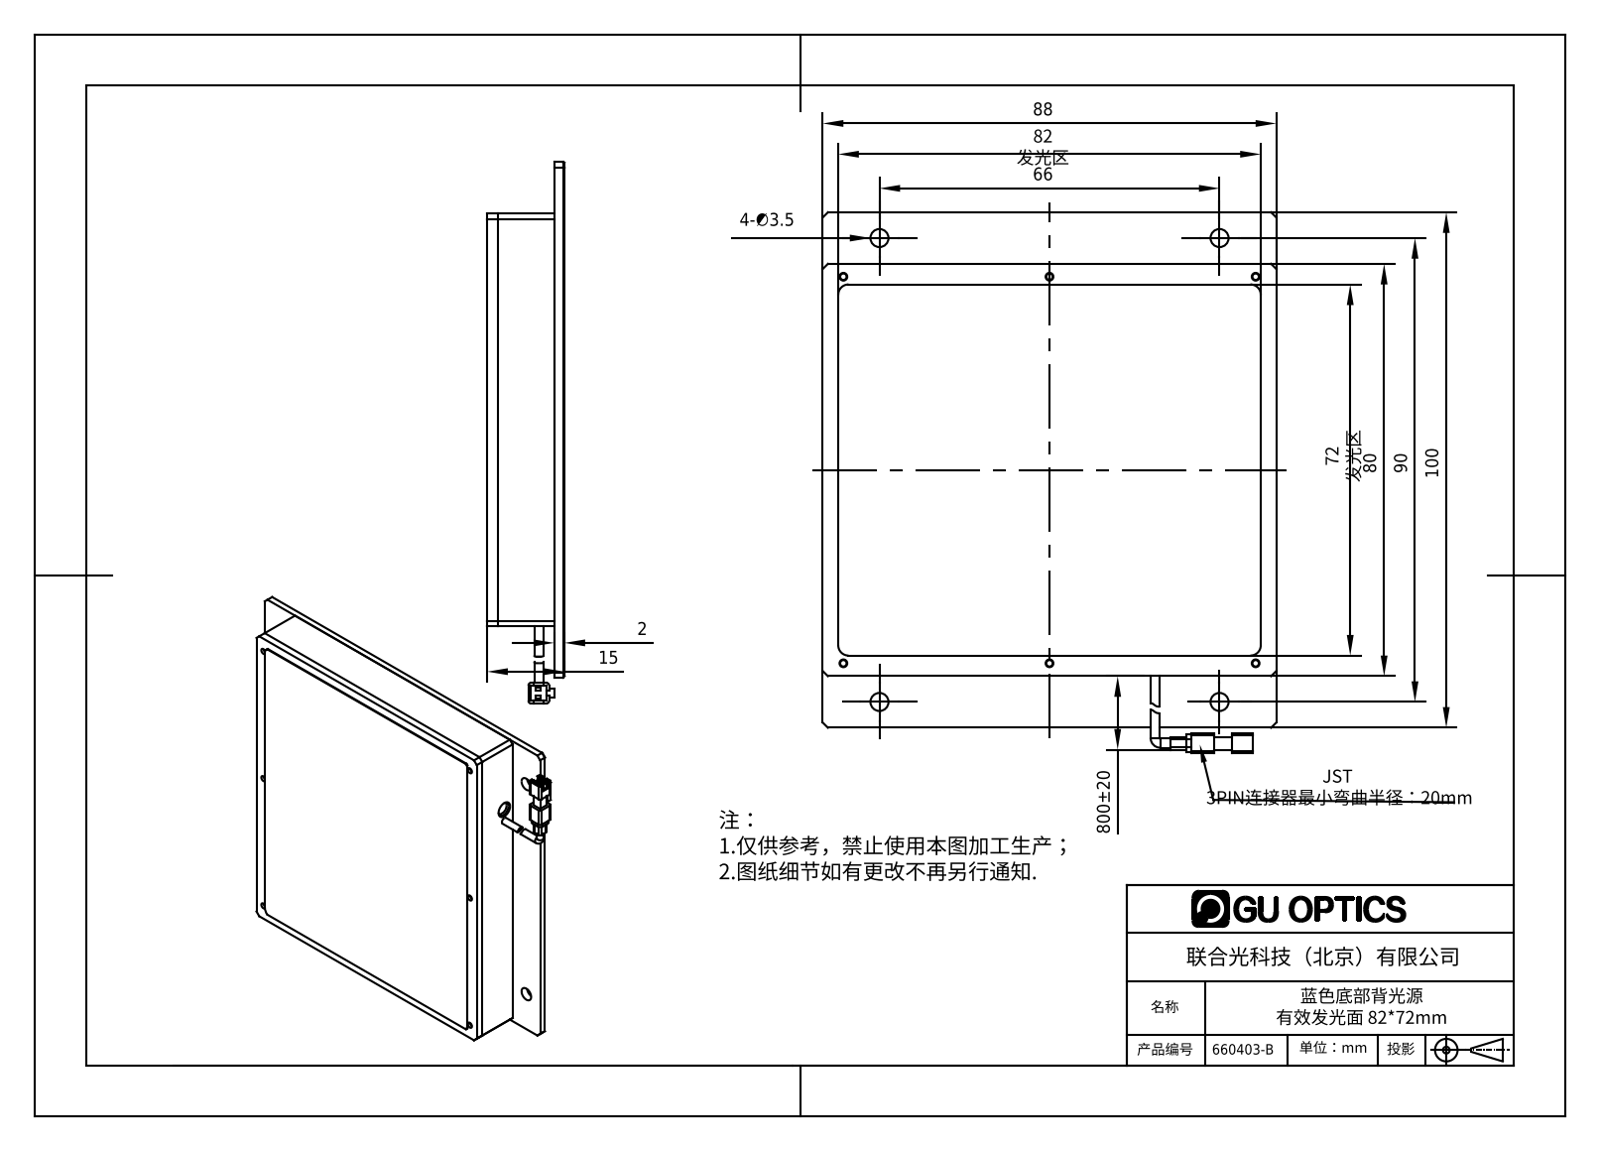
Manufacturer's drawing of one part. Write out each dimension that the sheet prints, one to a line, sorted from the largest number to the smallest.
800±20
100
90
88
82 发光区
80
72 发光区
66
15
4-∅3.5
2
